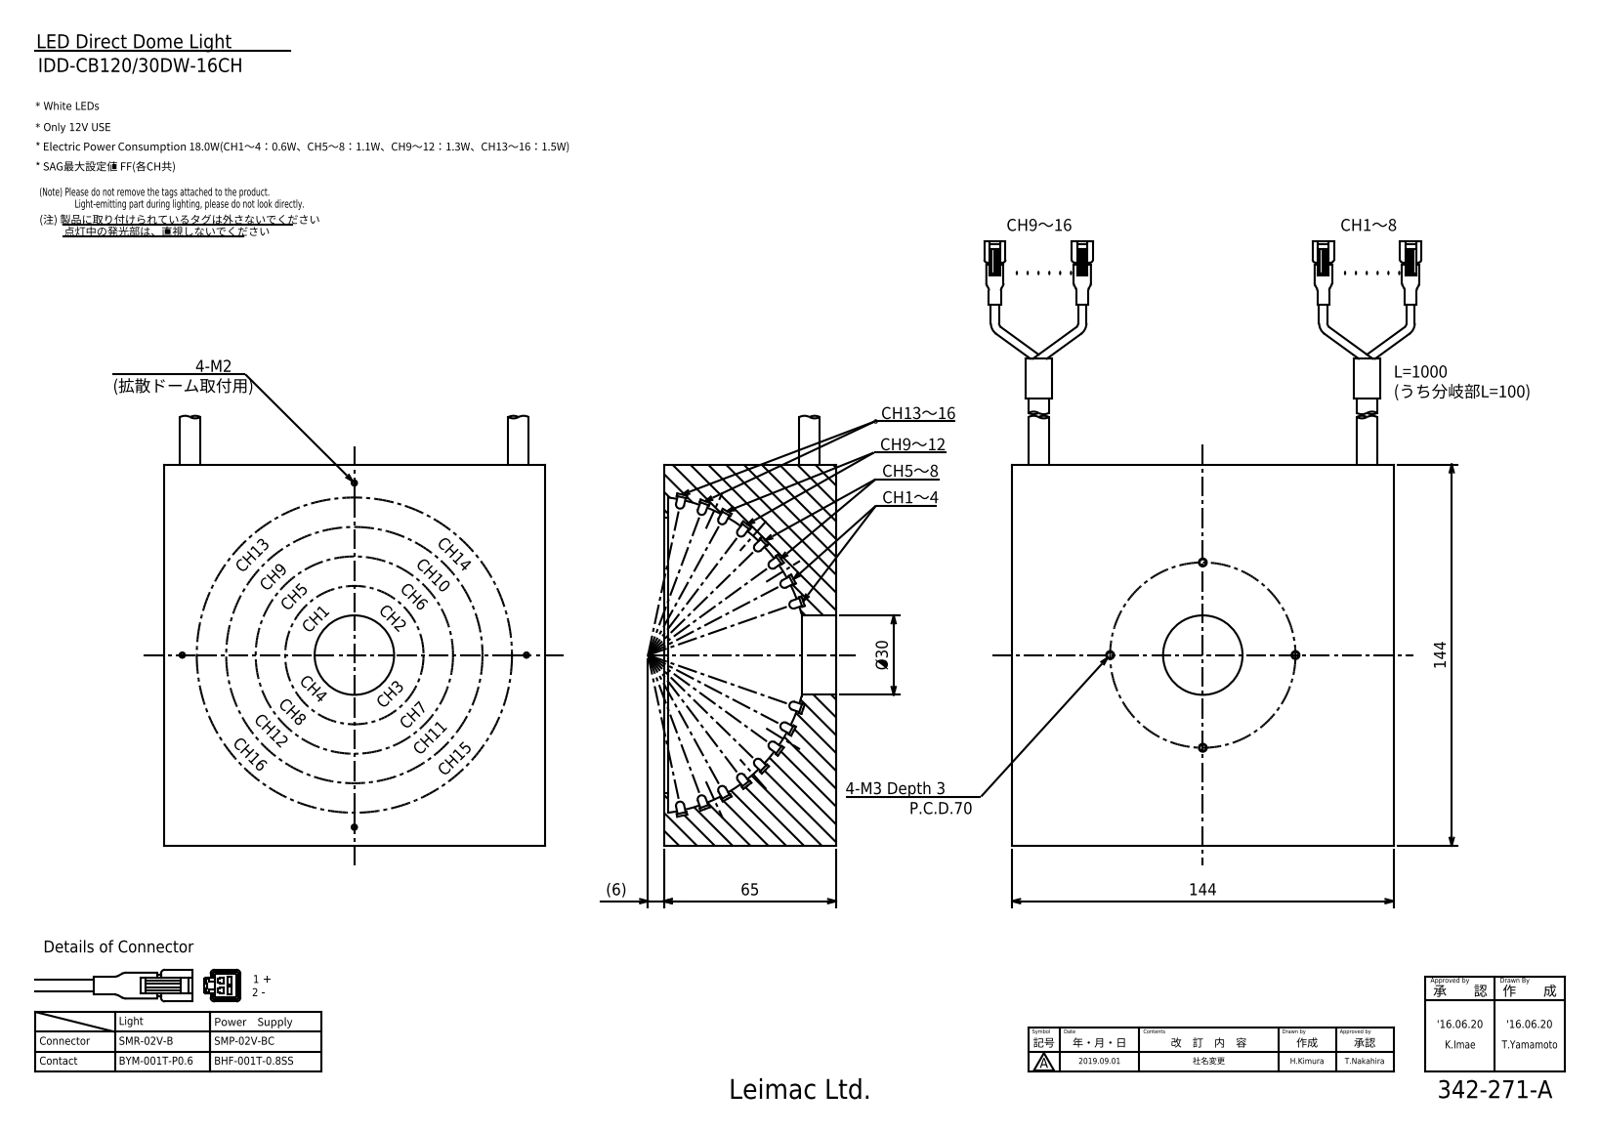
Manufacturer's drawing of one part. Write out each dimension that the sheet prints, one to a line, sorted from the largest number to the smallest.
144
144
65
Ø30
(6)
